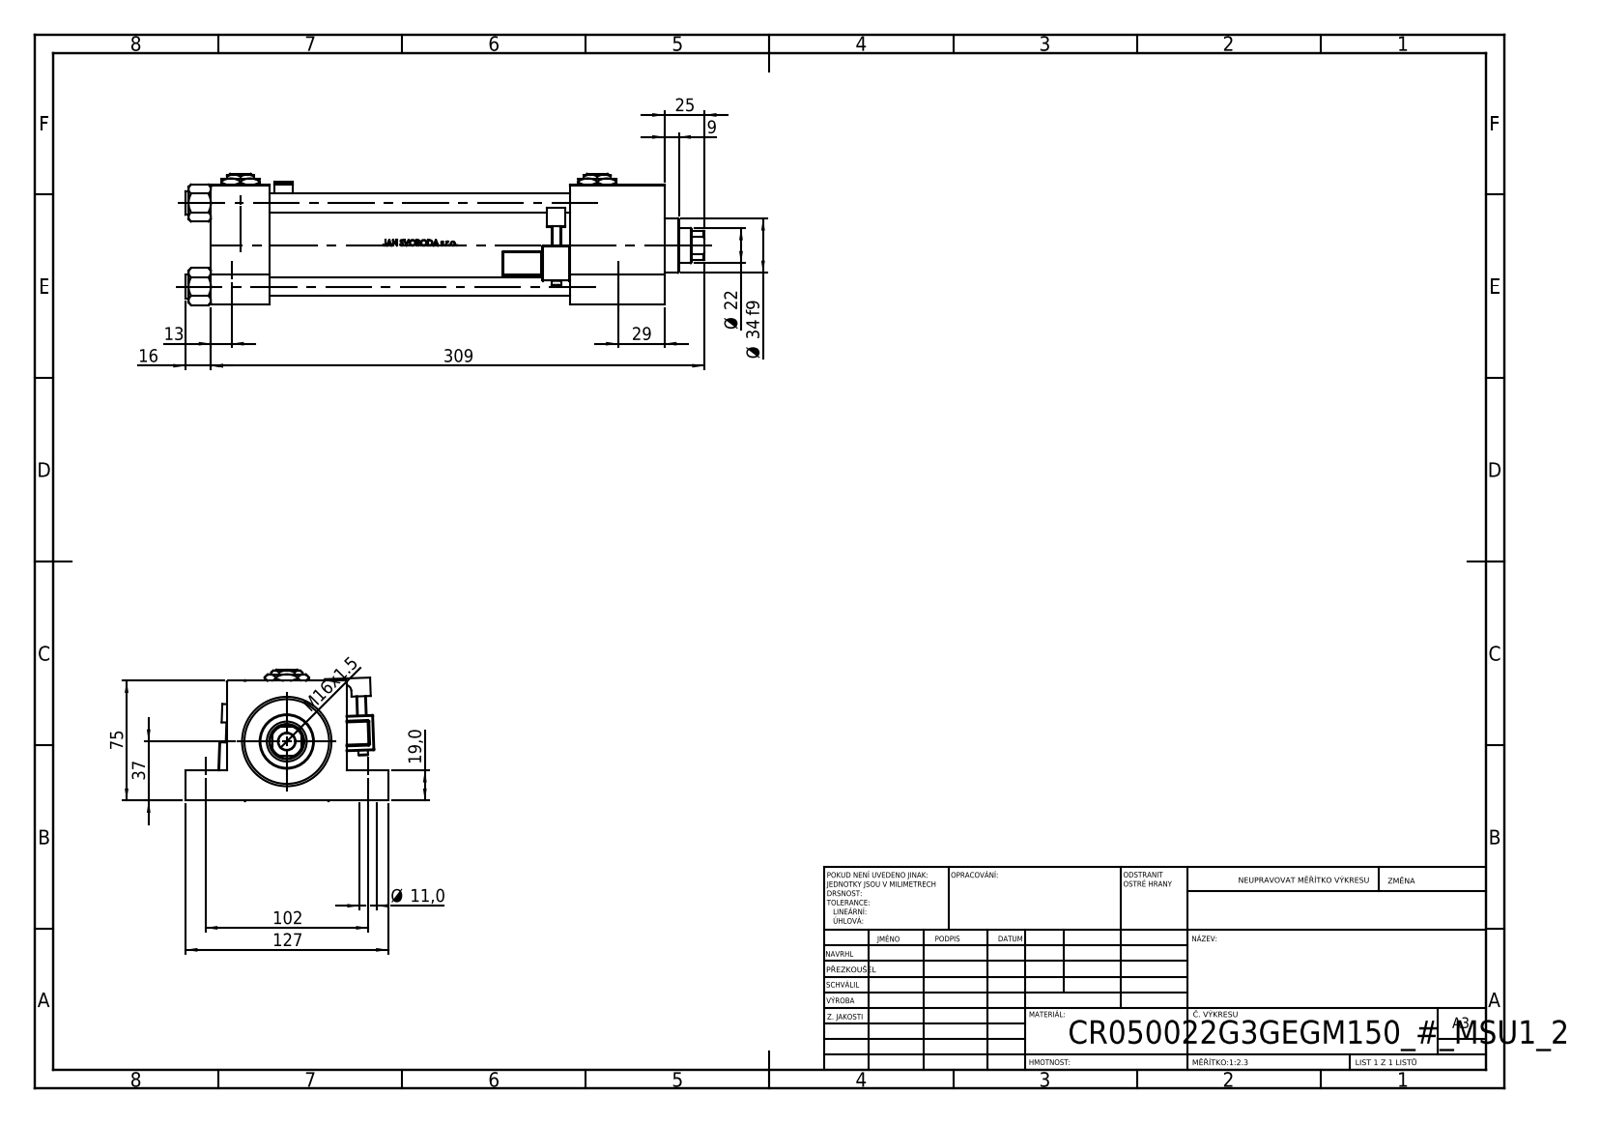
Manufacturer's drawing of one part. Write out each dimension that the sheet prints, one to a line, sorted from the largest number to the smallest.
309
127
102
75
37
Ø 34 f9
29
25
Ø 22
19,0
16
M16x1.5
13
Ø 11,0
9
